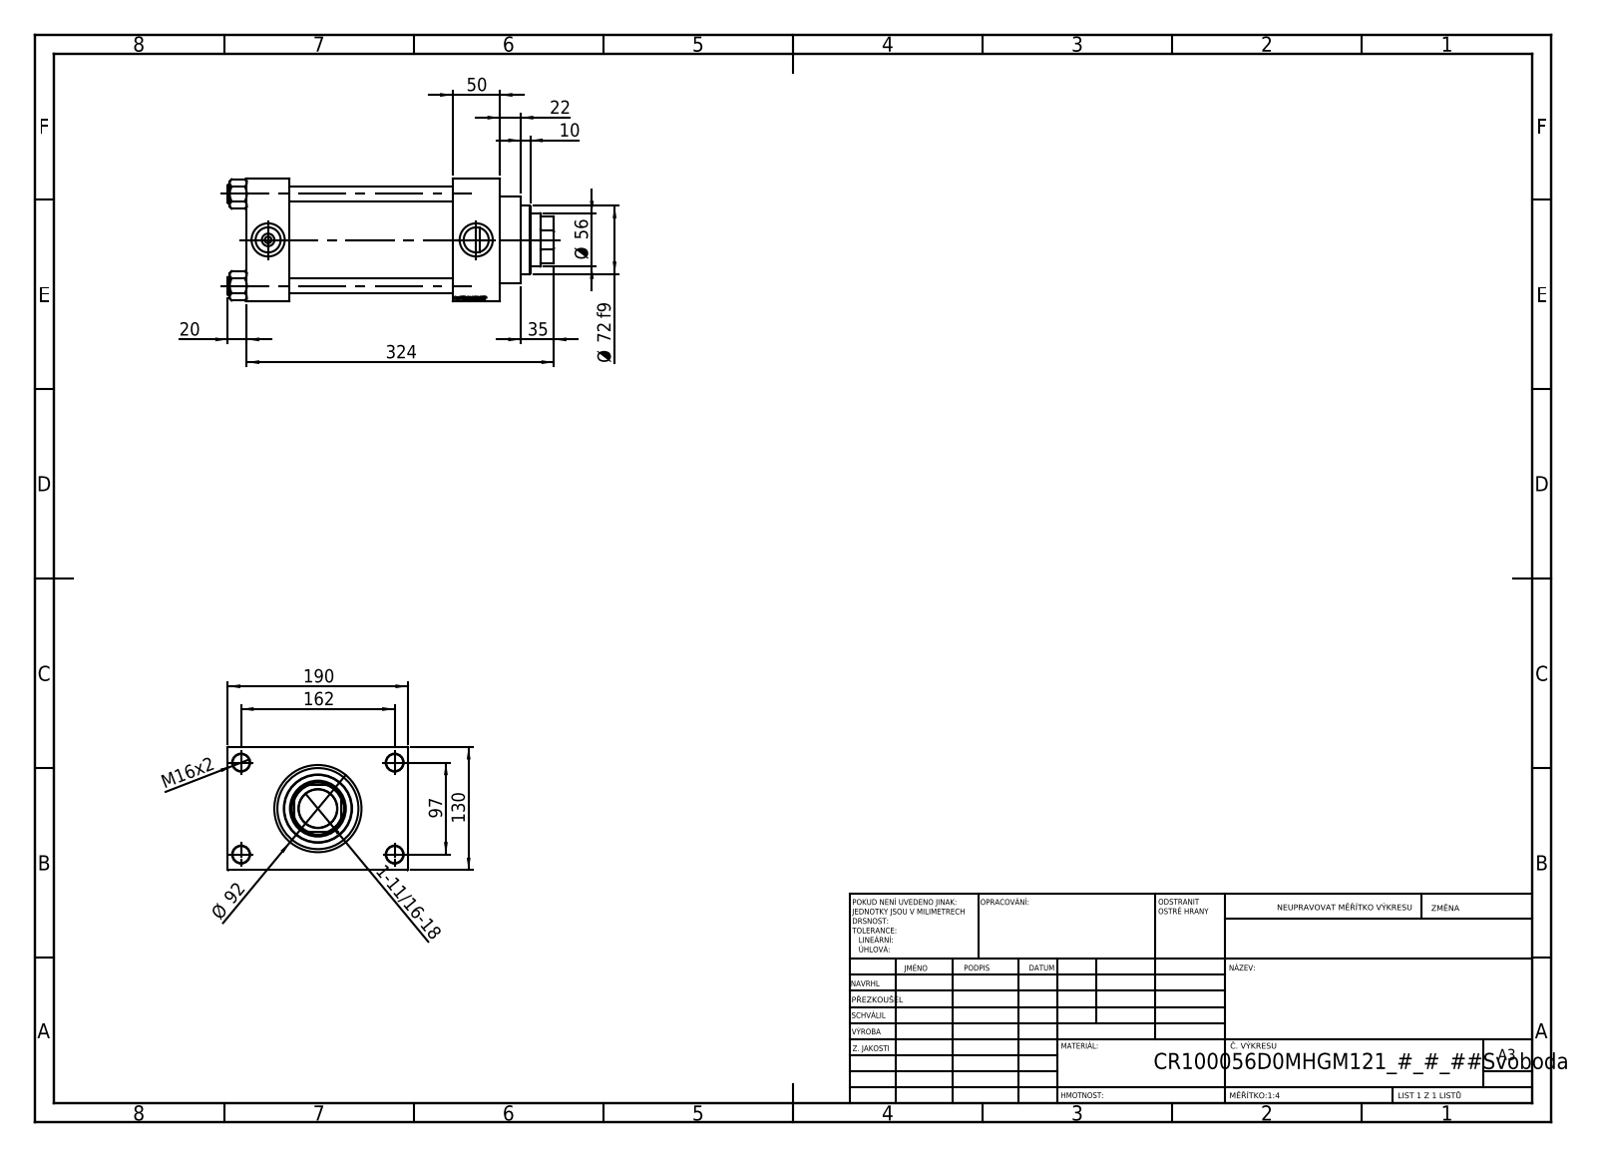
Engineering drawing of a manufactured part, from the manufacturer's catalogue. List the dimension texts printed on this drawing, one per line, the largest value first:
324
190
162
130
97
Ø 92
Ø 72 f9
Ø 56
50
35
22
20
M16x2
10
1-11/16-18
